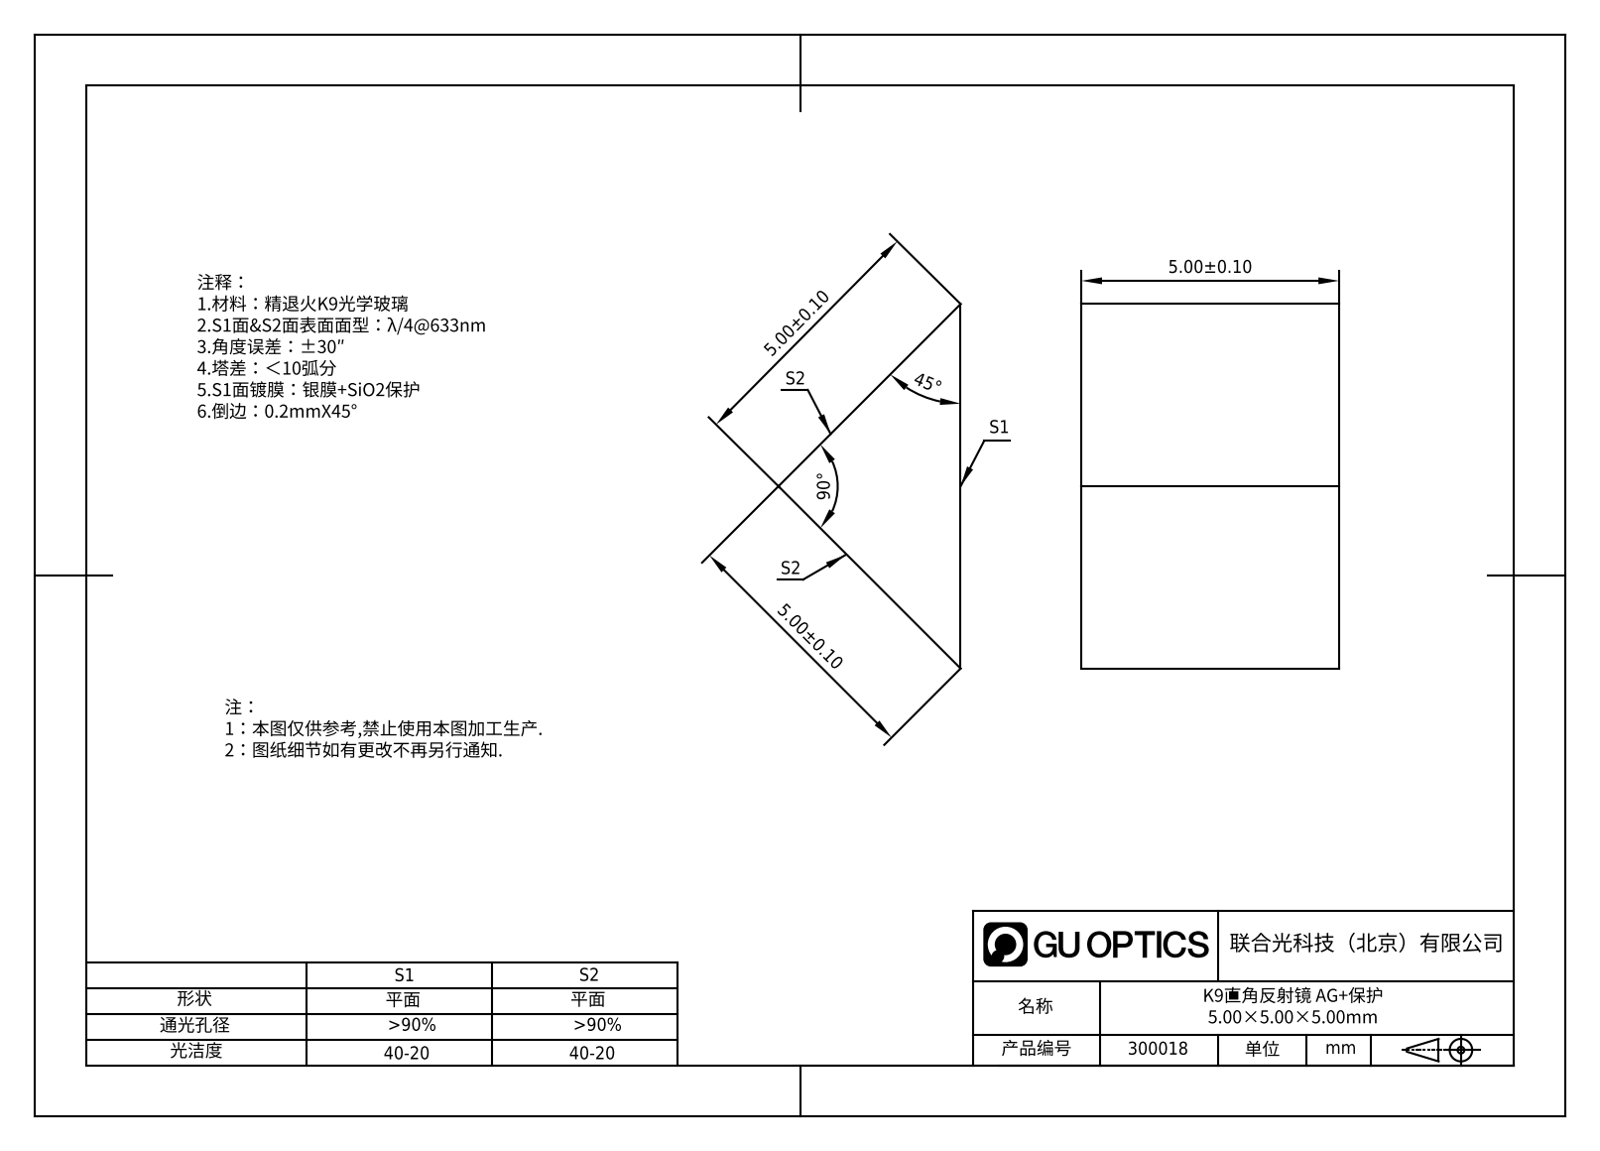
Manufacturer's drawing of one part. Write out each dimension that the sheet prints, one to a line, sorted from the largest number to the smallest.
90°
45°
5.00±0.10
5.00±0.10
5.00±0.10
